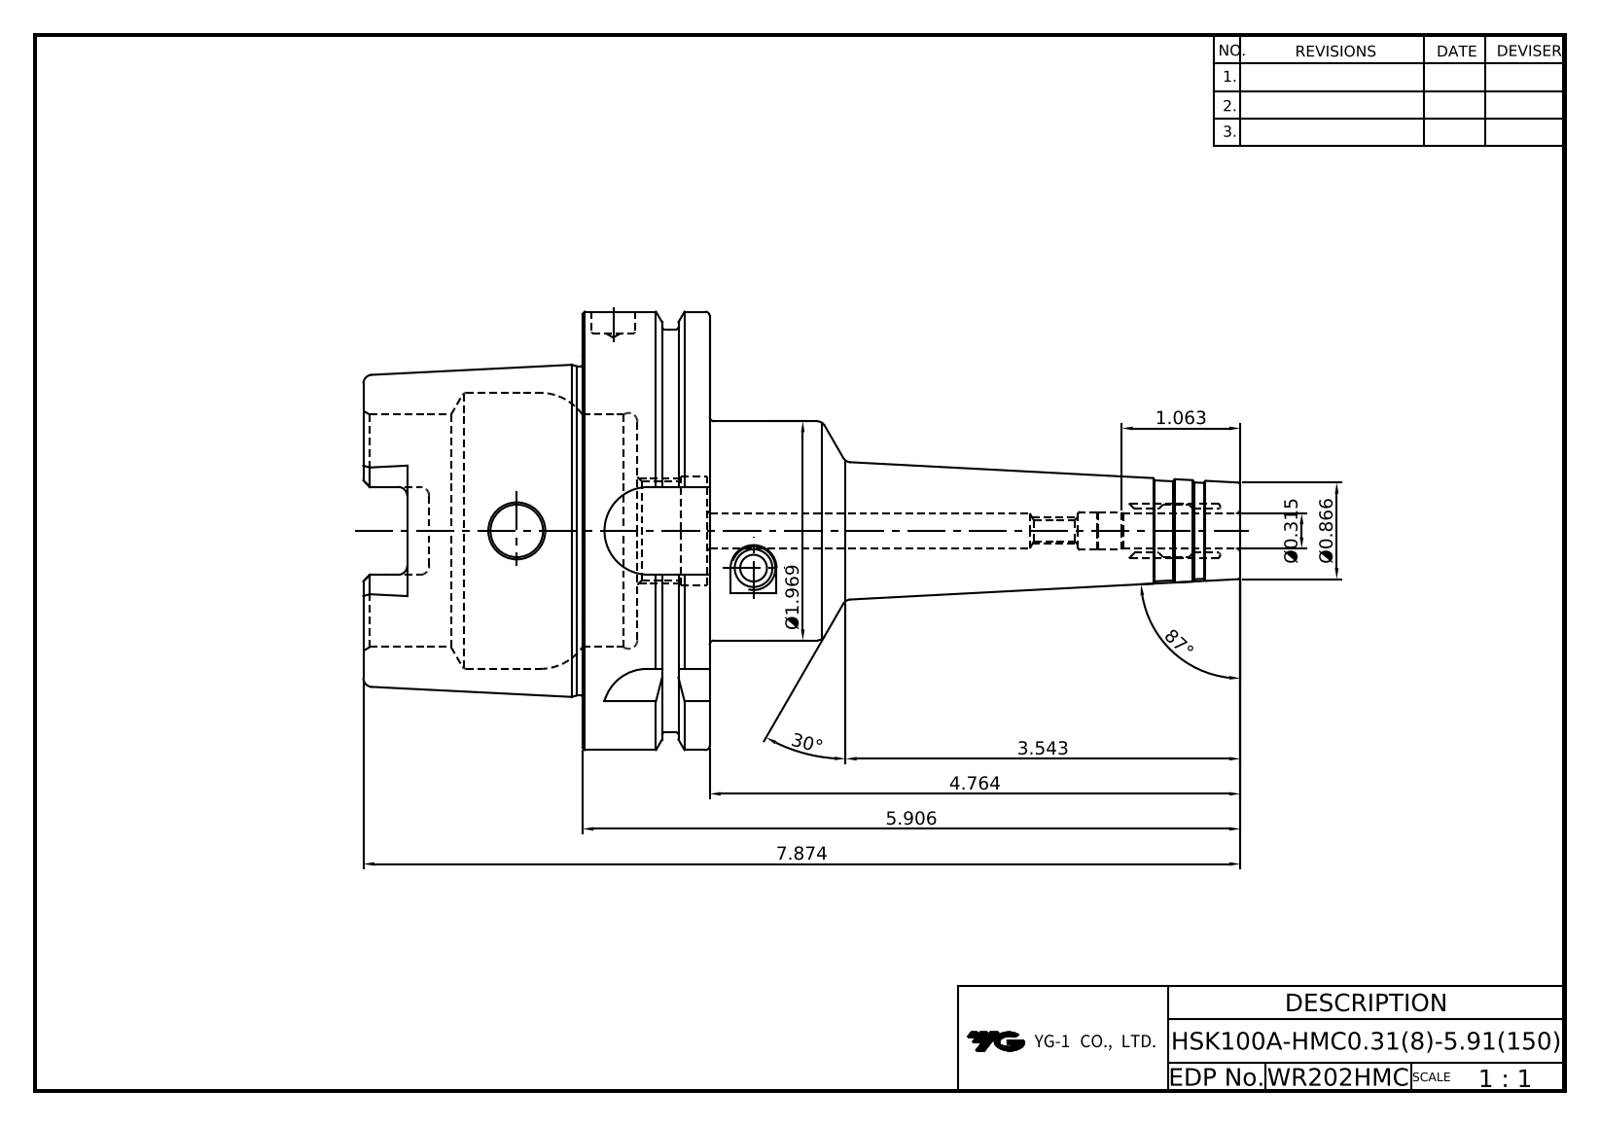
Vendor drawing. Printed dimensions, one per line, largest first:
87°
30°
7.874
5.906
4.764
3.543
Ø1.969
1.063
Ø0.866
Ø0.315
